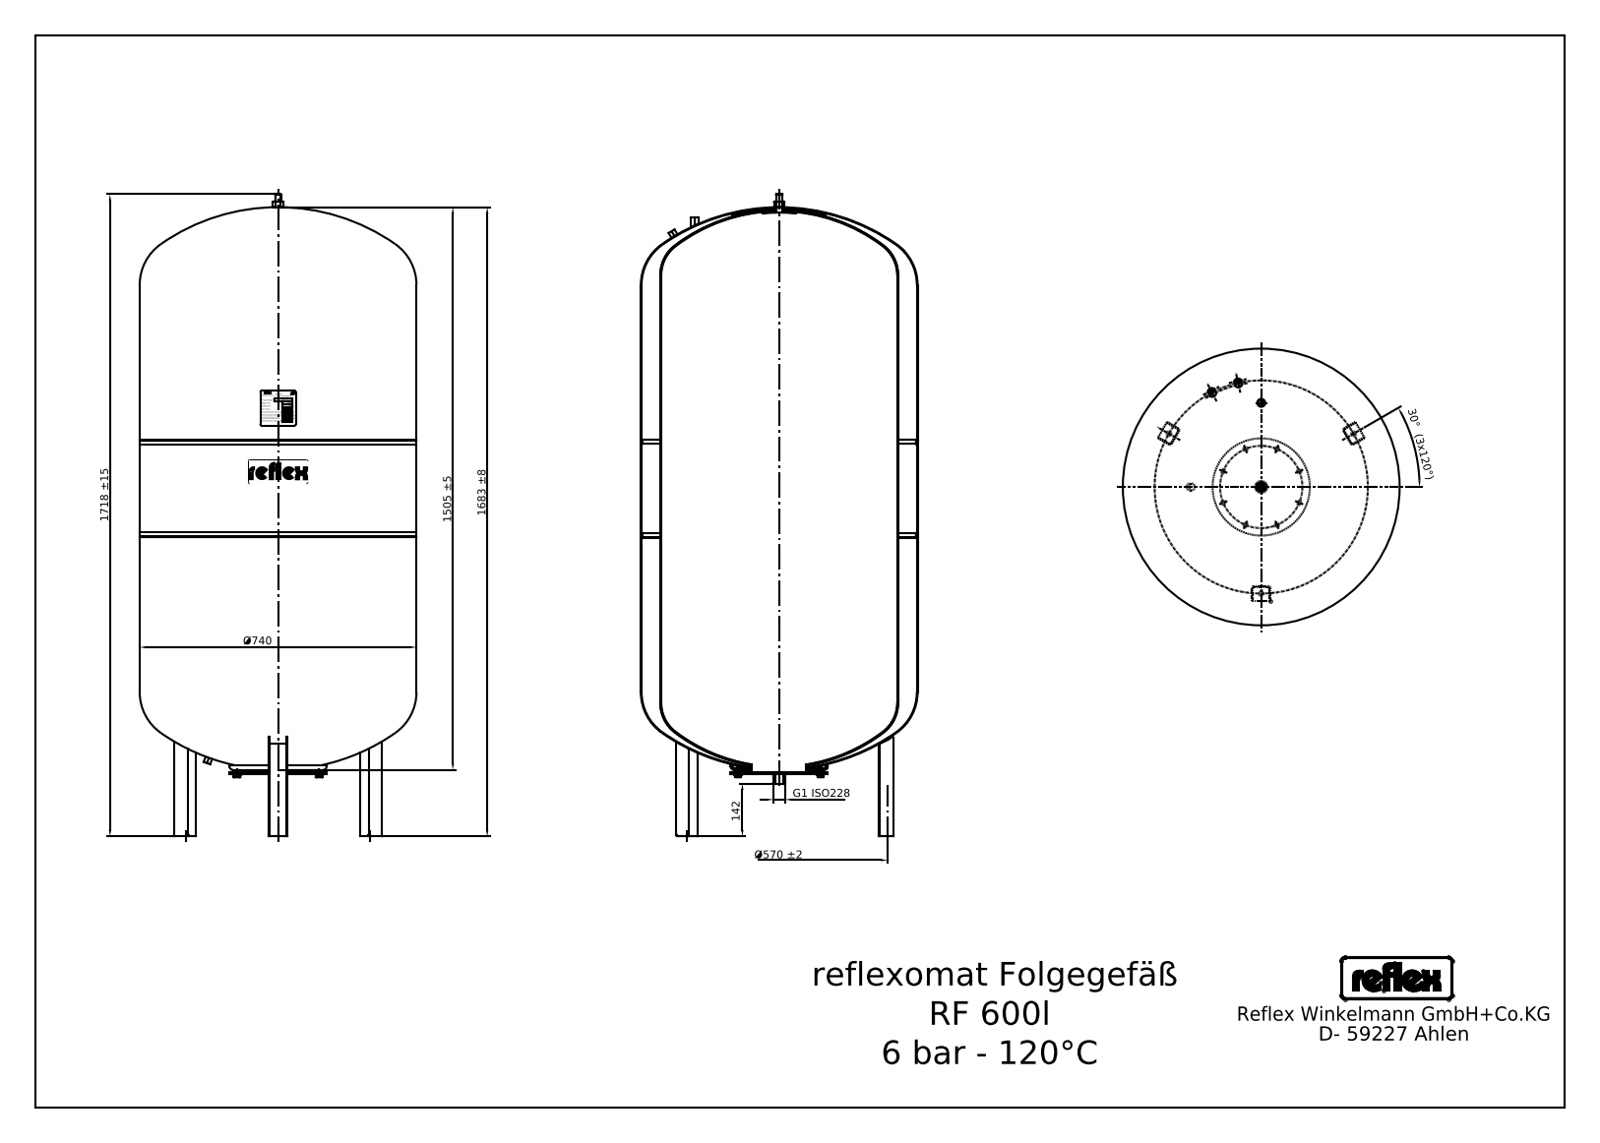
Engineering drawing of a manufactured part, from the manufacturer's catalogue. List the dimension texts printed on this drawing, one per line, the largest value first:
1718 ±15
1683 ±8
1505 ±5
Ø740
Ø570 ±2
142
30° (3x120°)
G1 ISO228
